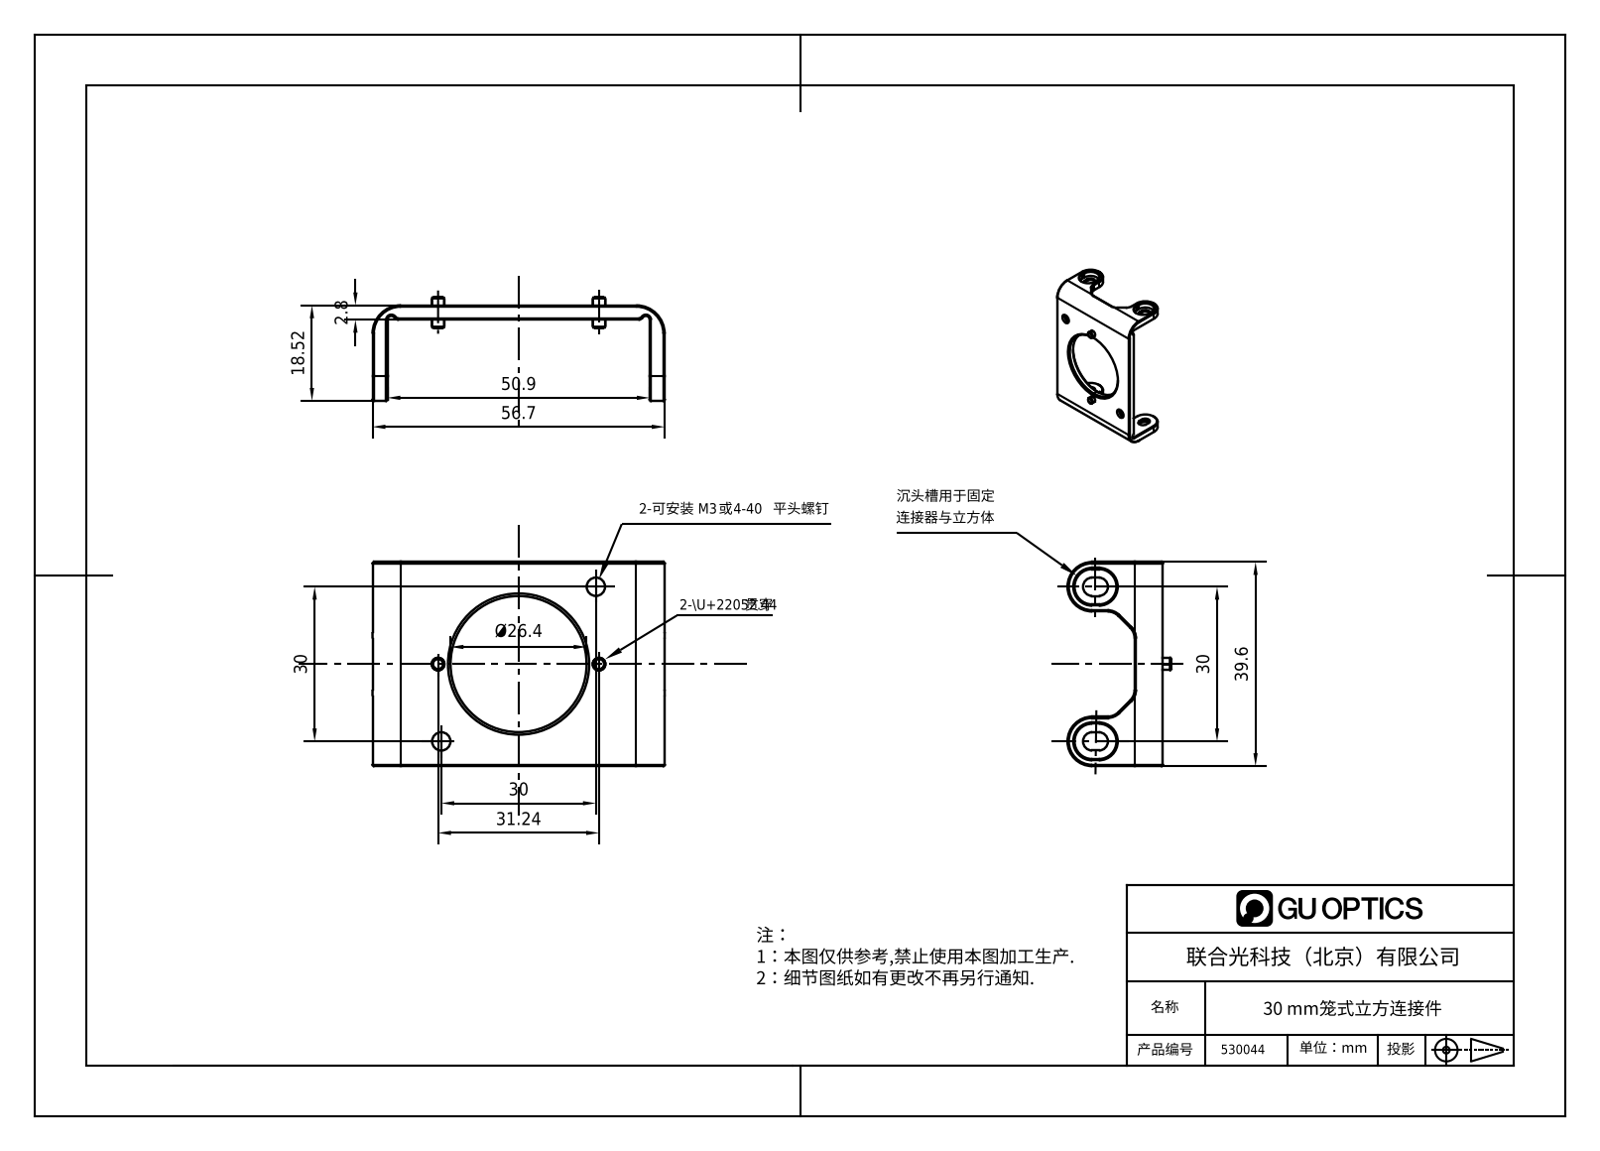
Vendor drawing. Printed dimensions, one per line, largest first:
56.7
50.9
39.6
31.24
30
30
30
Ø26.4
18.52
2.8
